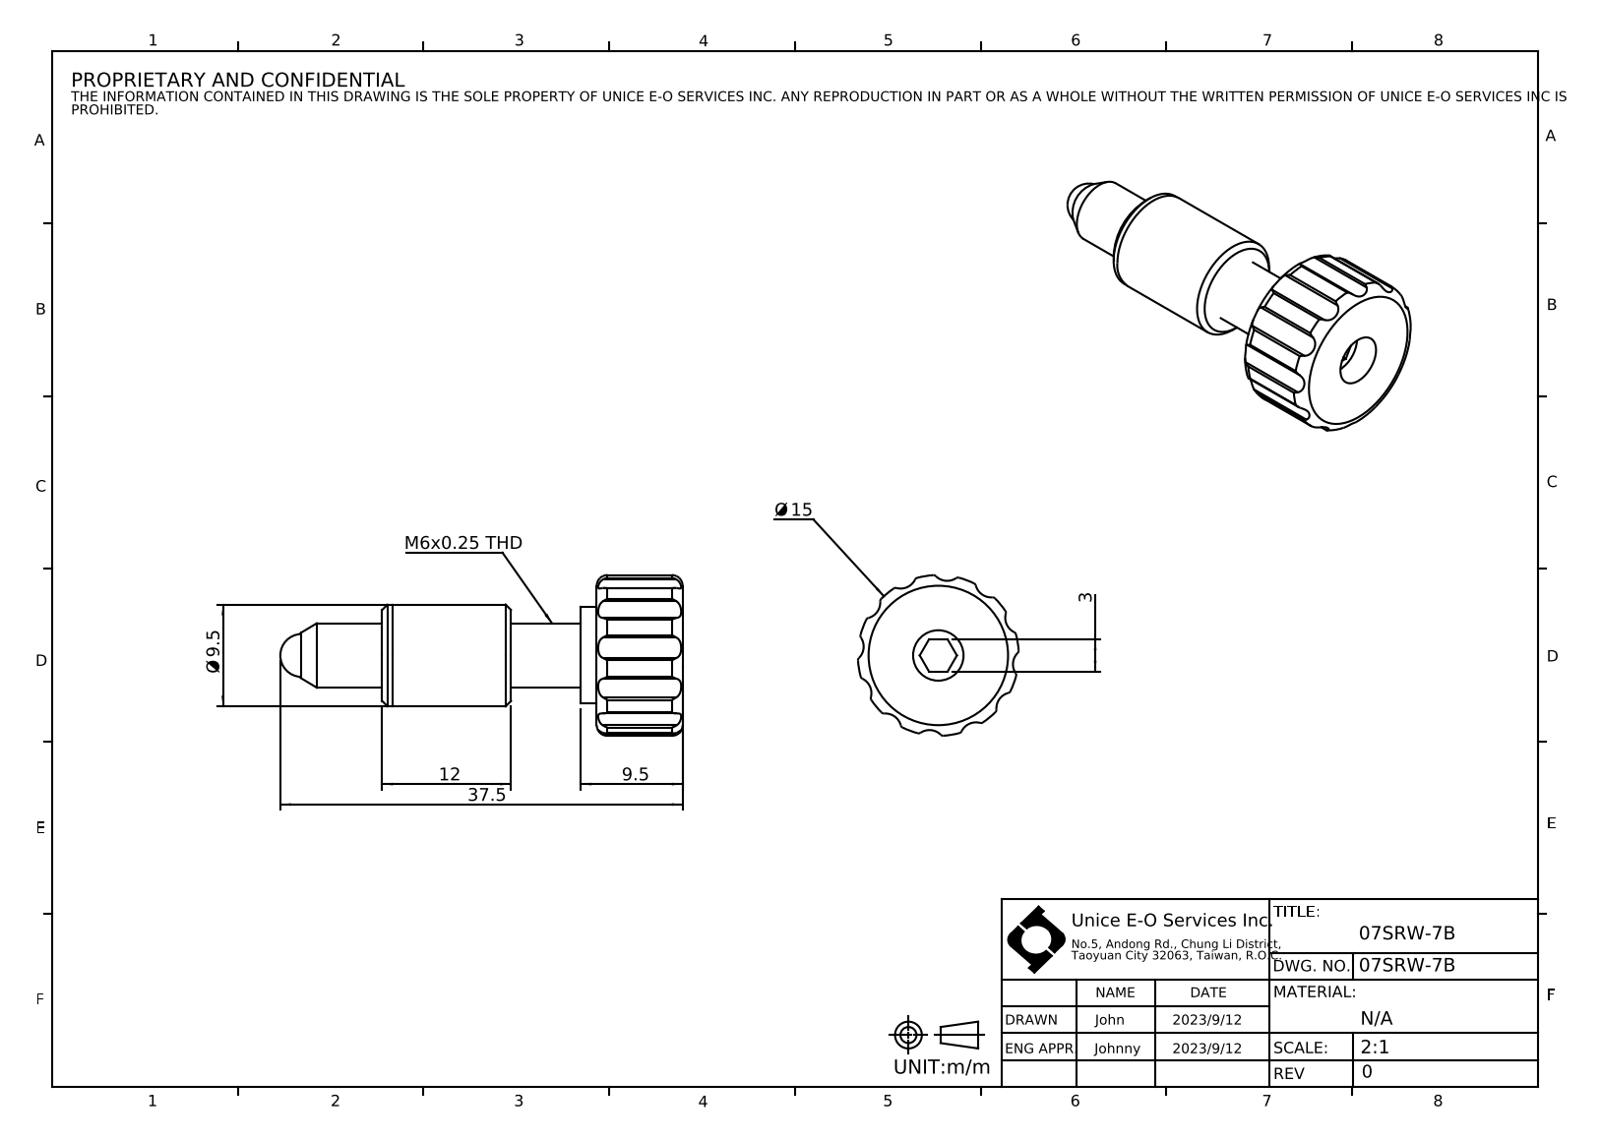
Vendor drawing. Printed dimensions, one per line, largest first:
37.5
Ø 15
12
9.5
Ø 9.5
3
